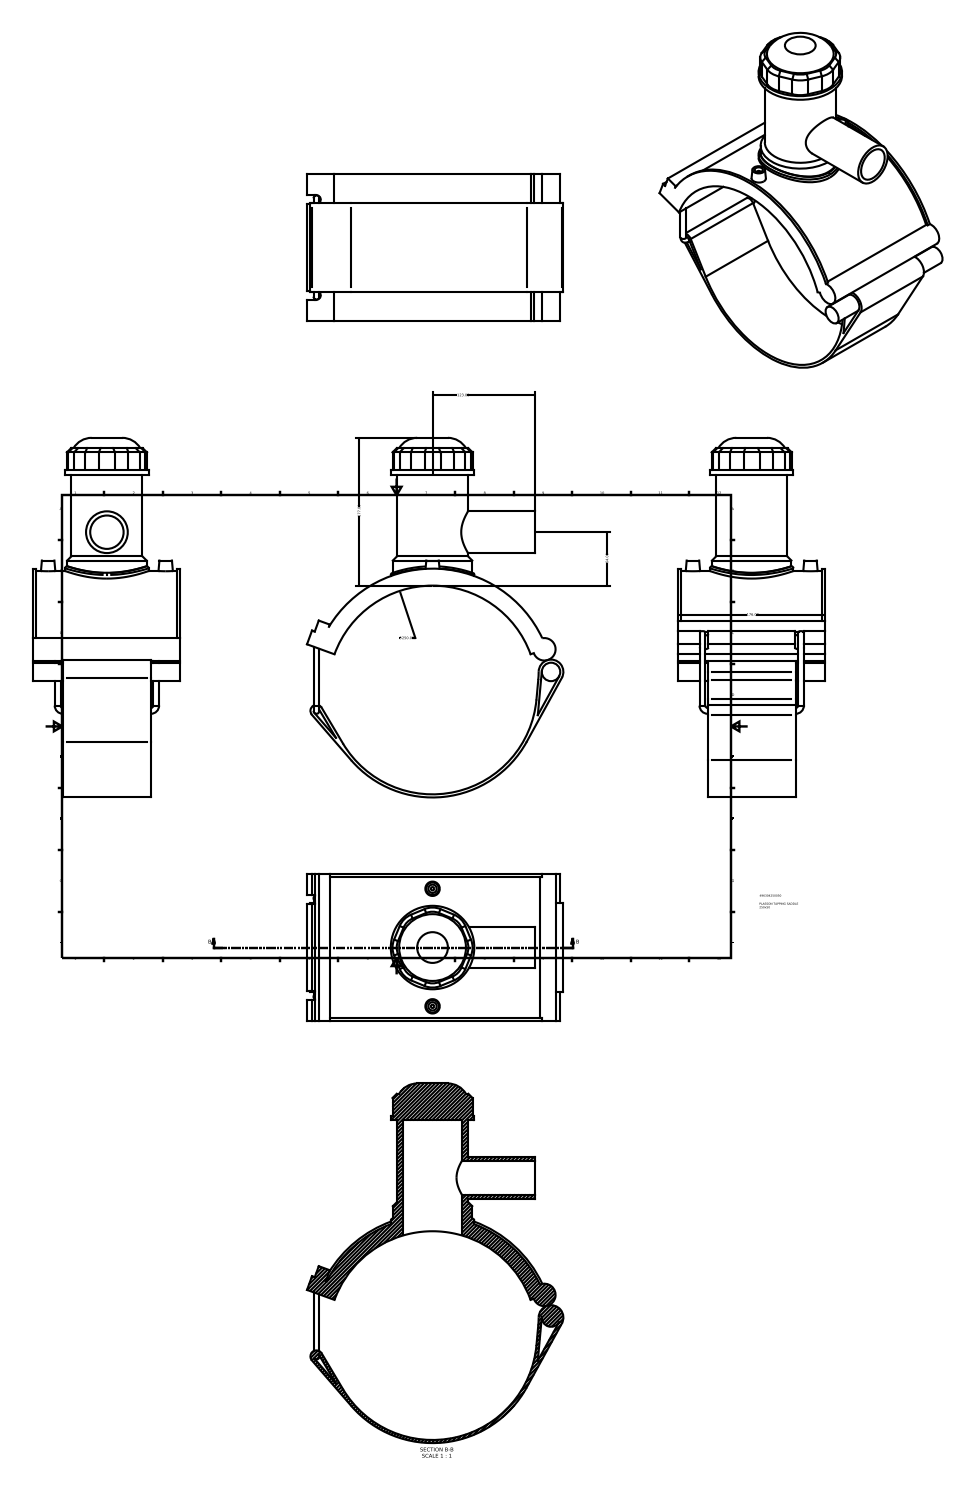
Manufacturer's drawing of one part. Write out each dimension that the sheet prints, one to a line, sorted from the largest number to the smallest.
∅250.00
177.00
176.00
123.00
64.00
